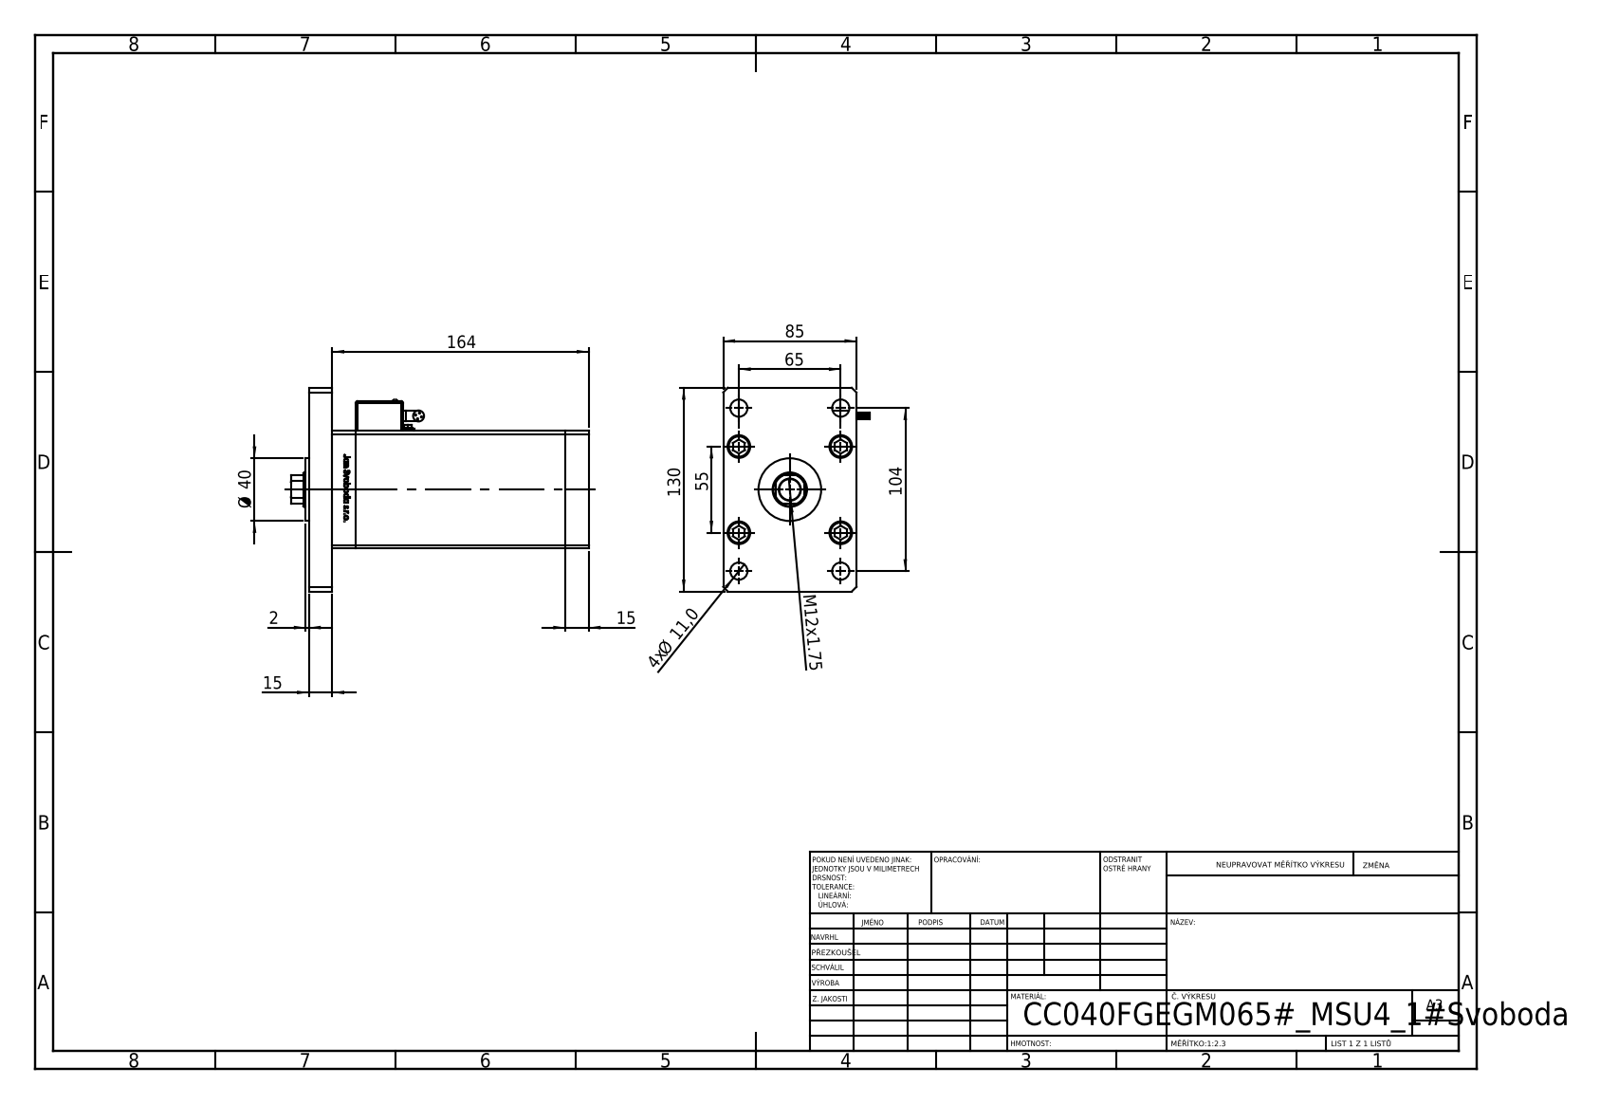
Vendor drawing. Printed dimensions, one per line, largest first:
164
130
104
85
65
55
Ø 40
15
15
M12x1.75
4x Ø 11,0
2
